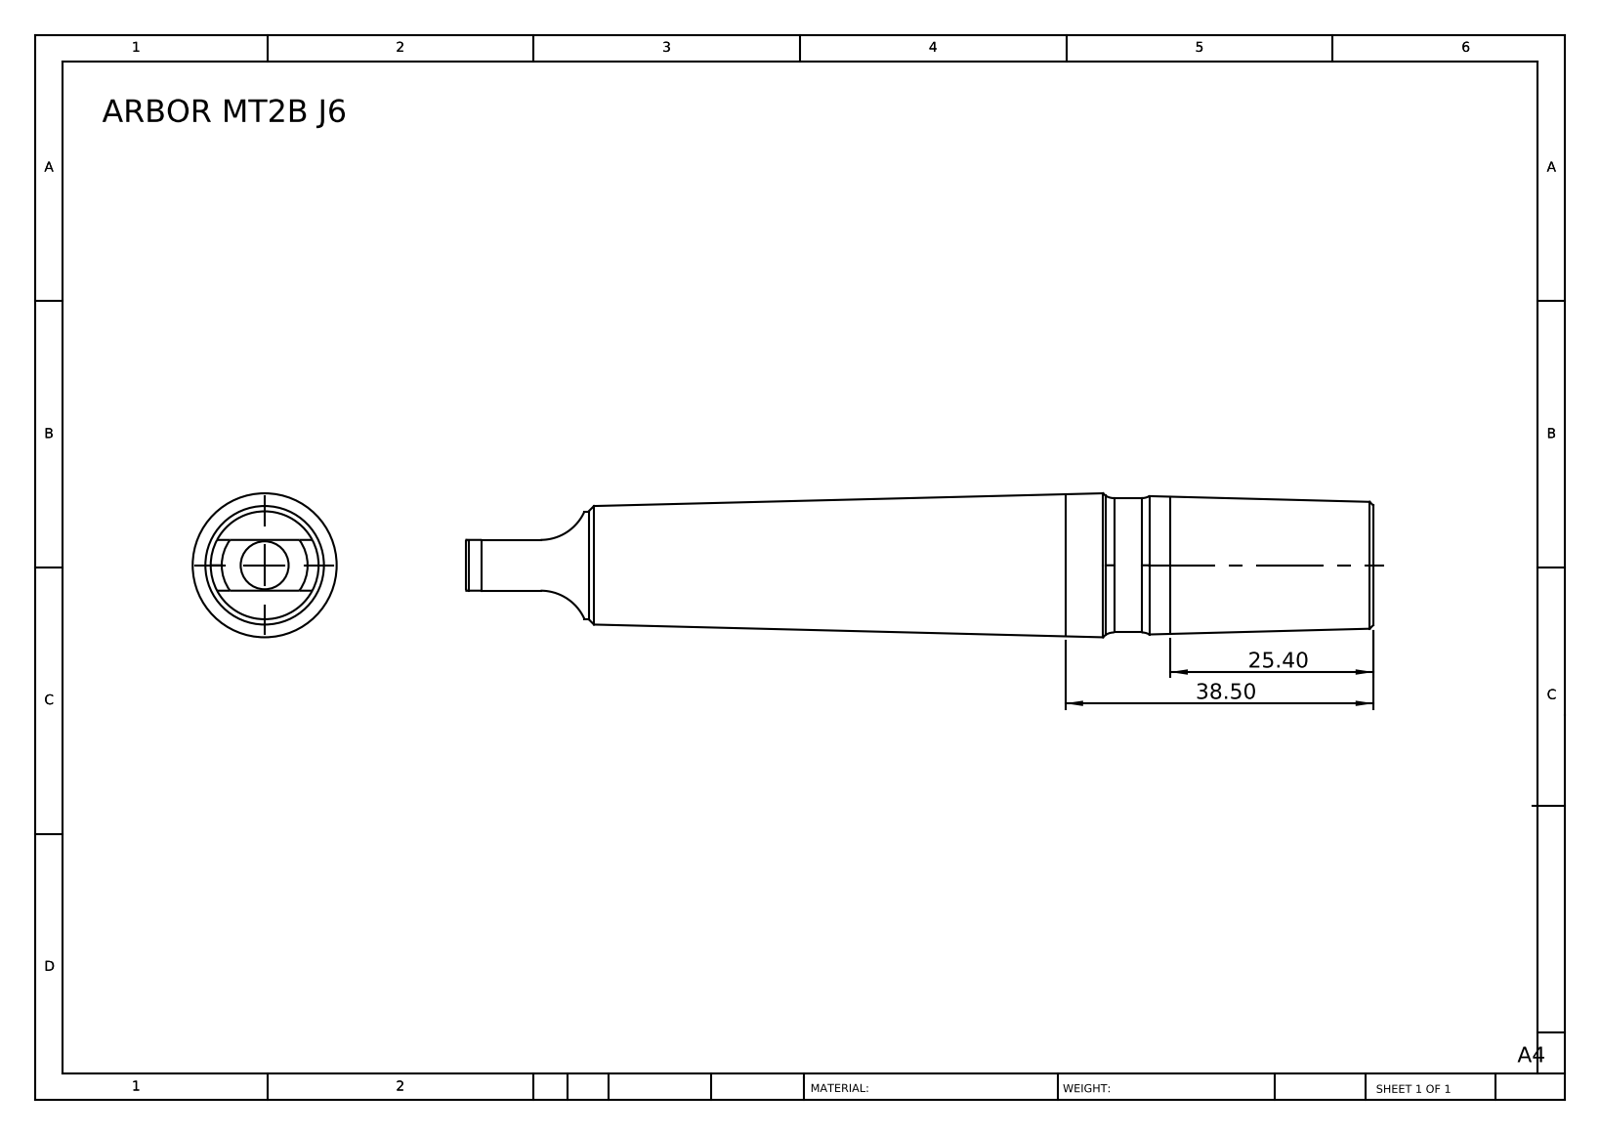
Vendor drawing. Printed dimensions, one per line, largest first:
38.50
25.40
